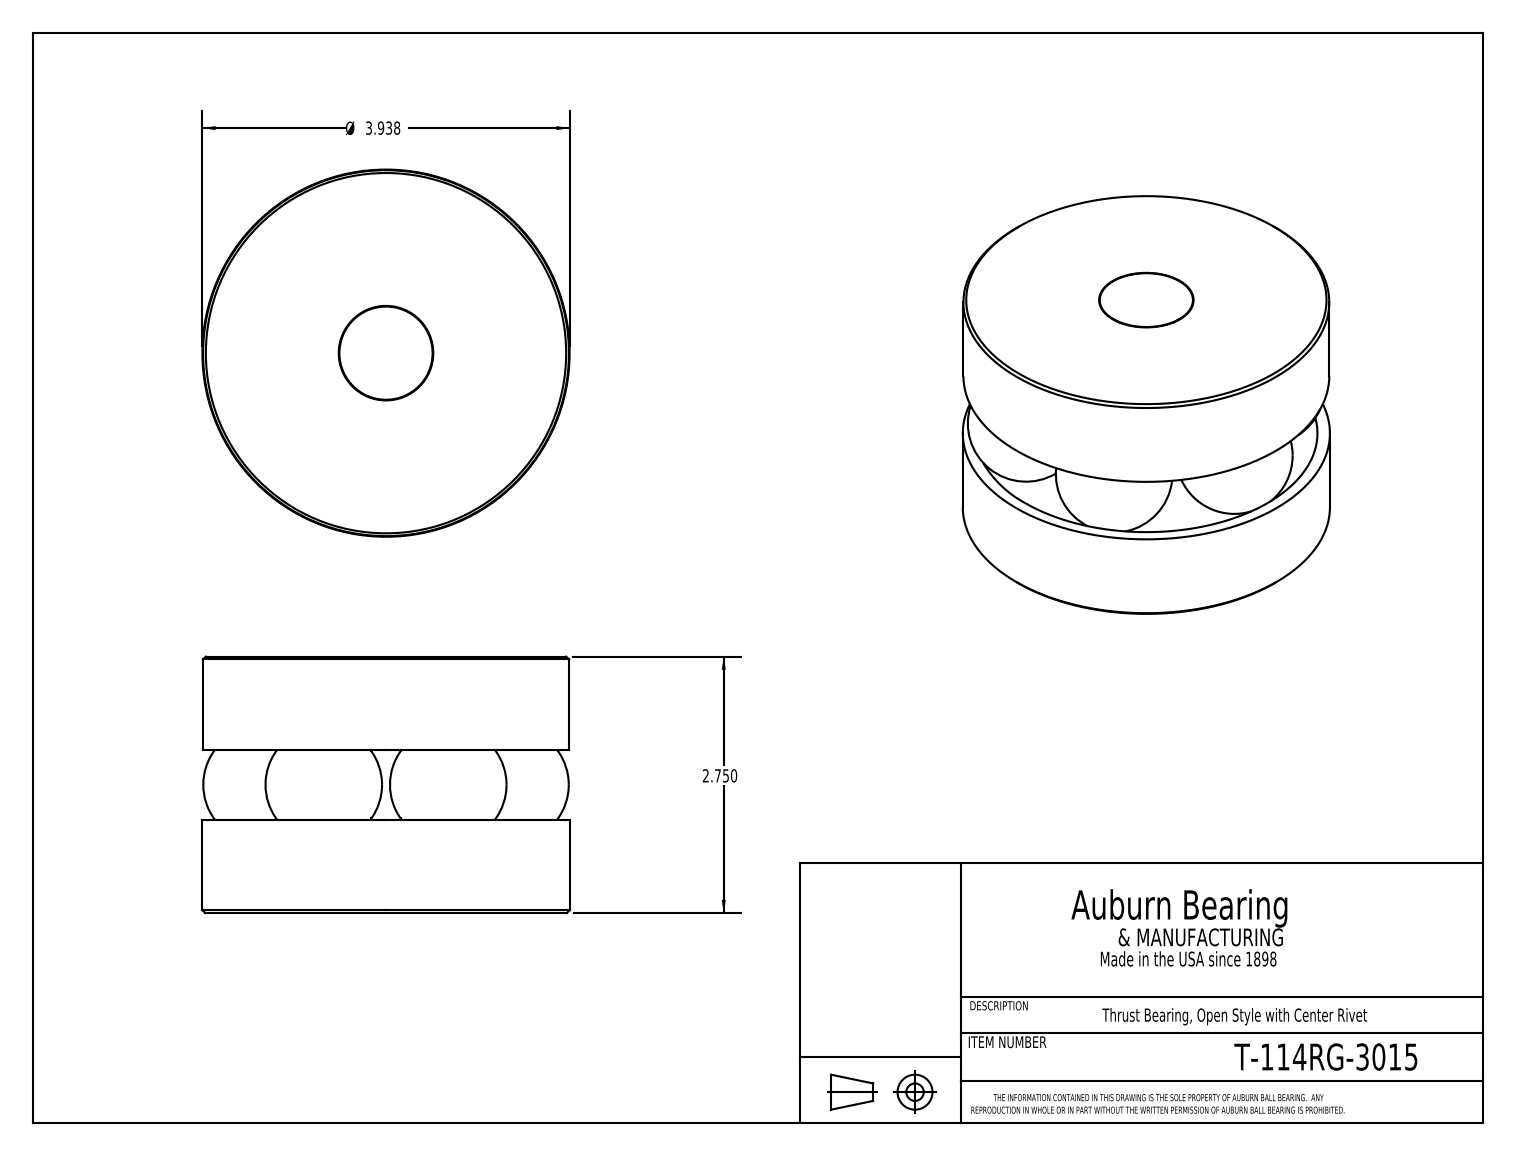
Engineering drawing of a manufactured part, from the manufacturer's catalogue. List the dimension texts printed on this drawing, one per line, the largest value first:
Ø 3.938
2.750
